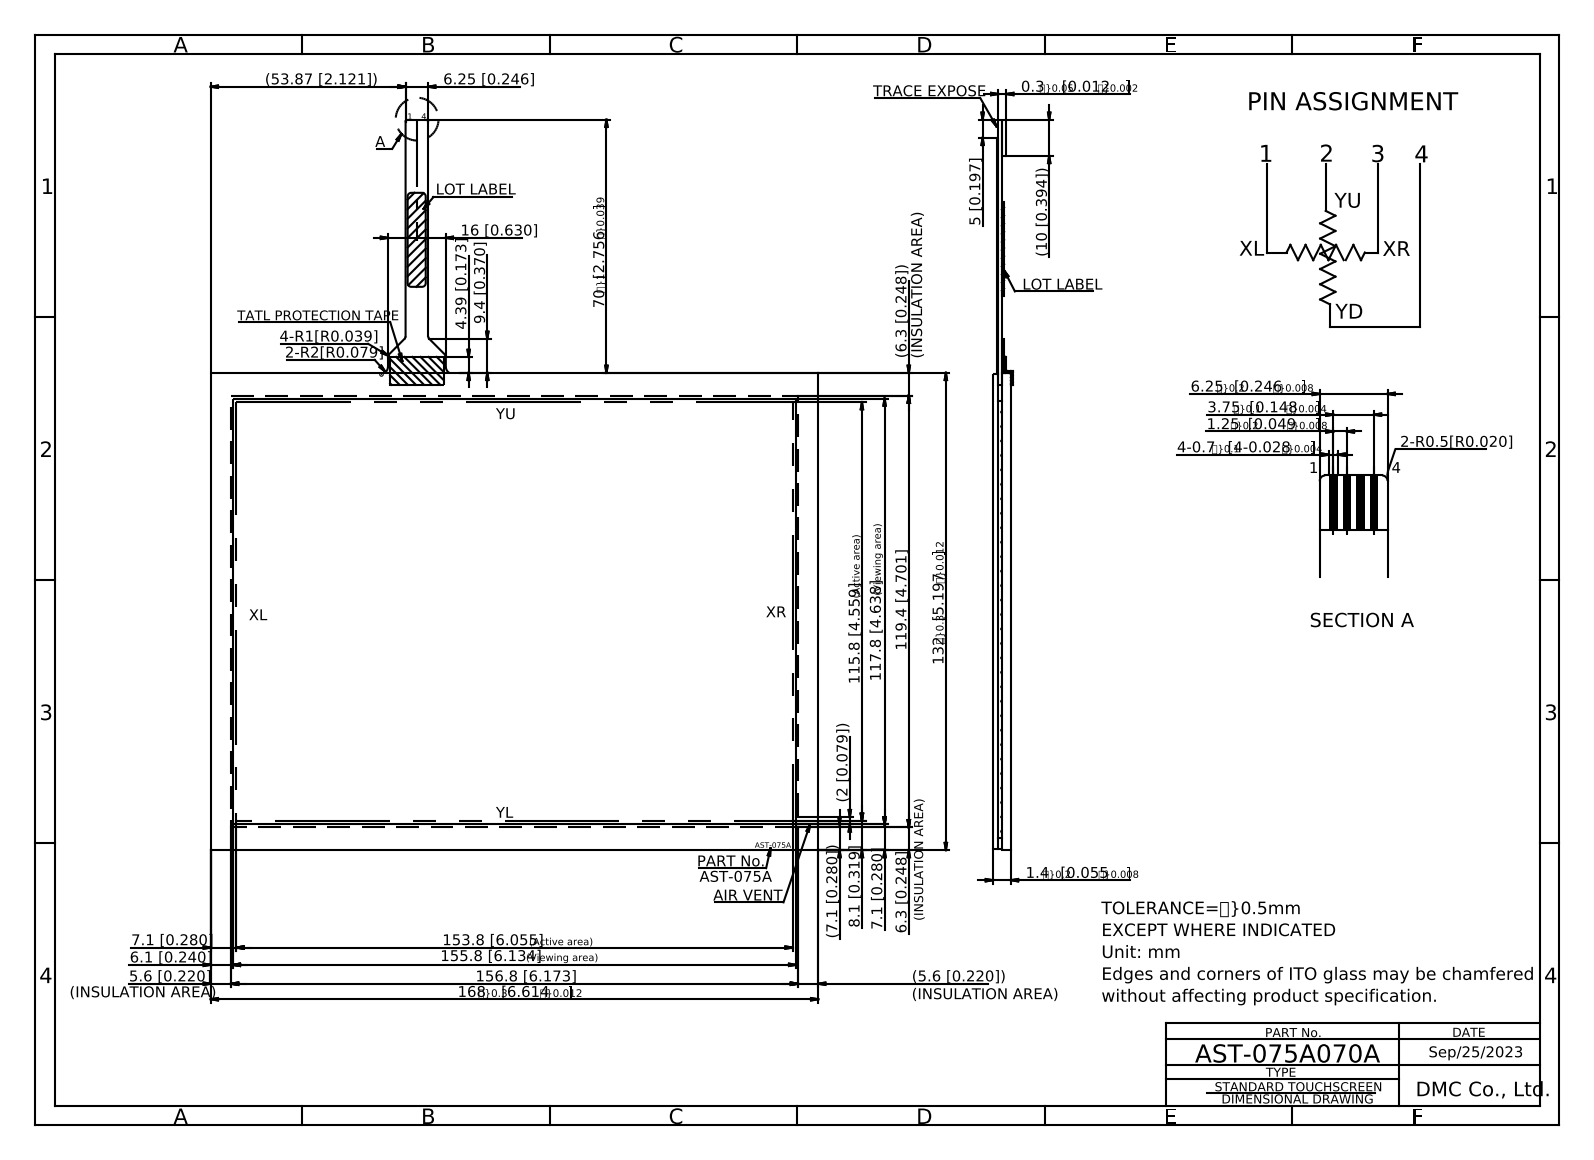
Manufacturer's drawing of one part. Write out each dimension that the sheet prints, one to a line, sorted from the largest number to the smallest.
168.00
156.8 [6.173]
155.80 {\H0.6667x;(Viewing area)}
153.80 {\H0.6667x;(Active area)}
132.00
119.4 [4.701]
117.80 {\H0.6667x;(Viewing area)}
115.80 {\H0.6667x;(Active area)}
70.00
(53.87 [2.121])
16 [0.630]
(10 [0.394])
9.4 [0.370]
8.1 [0.319]
(7.1 [0.280])
7.1 [0.280]
7.1 [0.280]
(6.3 [0.248])
6.3 [0.248]
6.25{\H0.6667x;?}0.2}[0.246{\H0.66667x;?}0.008}]
6.25 [0.246]
6.1 [0.240]
(5.6 [0.220])
5.6 [0.220]
5 [0.197]
4.39 [0.173]
4-0.7{\H0.66667x;?}0.1}[4-0.028{\H0.66667x;?}0.004}]
3.75{\H0.66667x;?}0.1}[0.148{\H0.66667x;?}0.004}]
(2 [0.079])
1.4{\H0.6667x;?}0.2}[0.055{\H0.66667x;?}0.008}]
1.25{\H0.66667x;?}0.2}[0.049{\H0.66667x;?}0.008}]
0.3{\H0.6667x;?}0.05}[0.012{\H0.66667x;?}0.002}]
